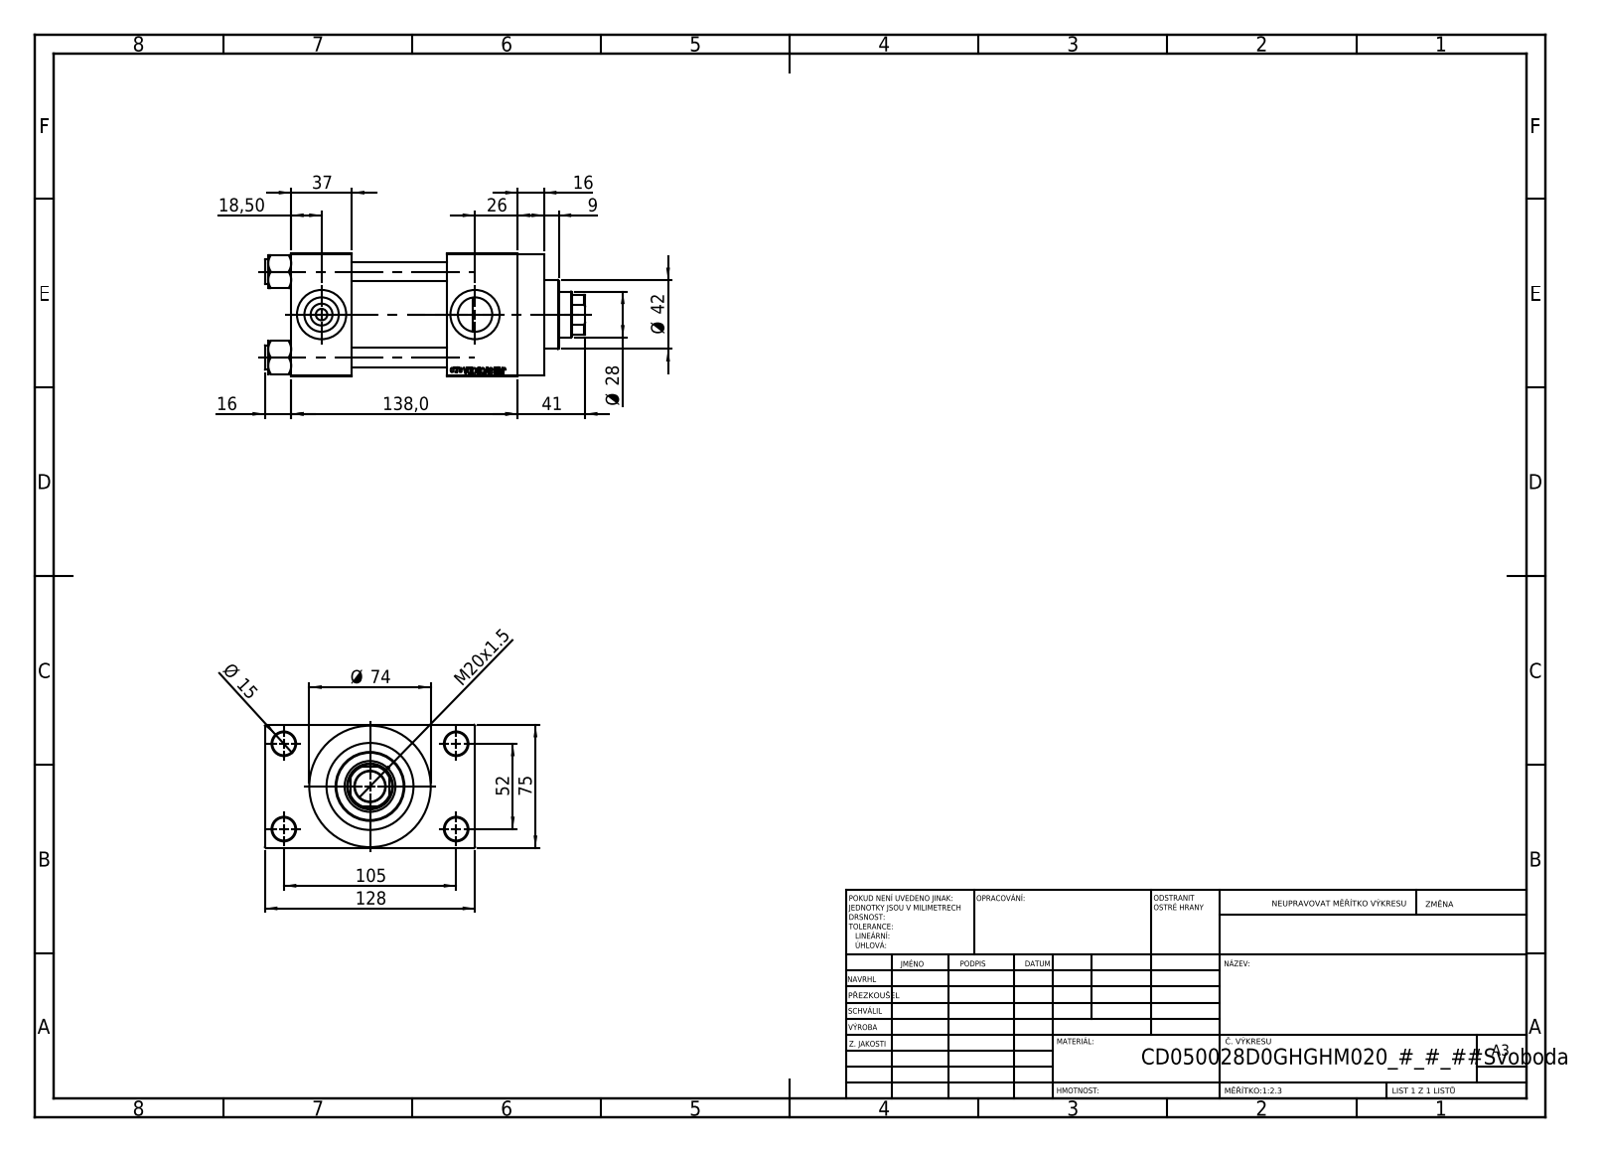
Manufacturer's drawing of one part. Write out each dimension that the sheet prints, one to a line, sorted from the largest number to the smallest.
138,0
128
105
75
Ø 74
52
Ø 42
41
37
Ø 28
26
M20x1.5
18,50
16
16
Ø 15
9
